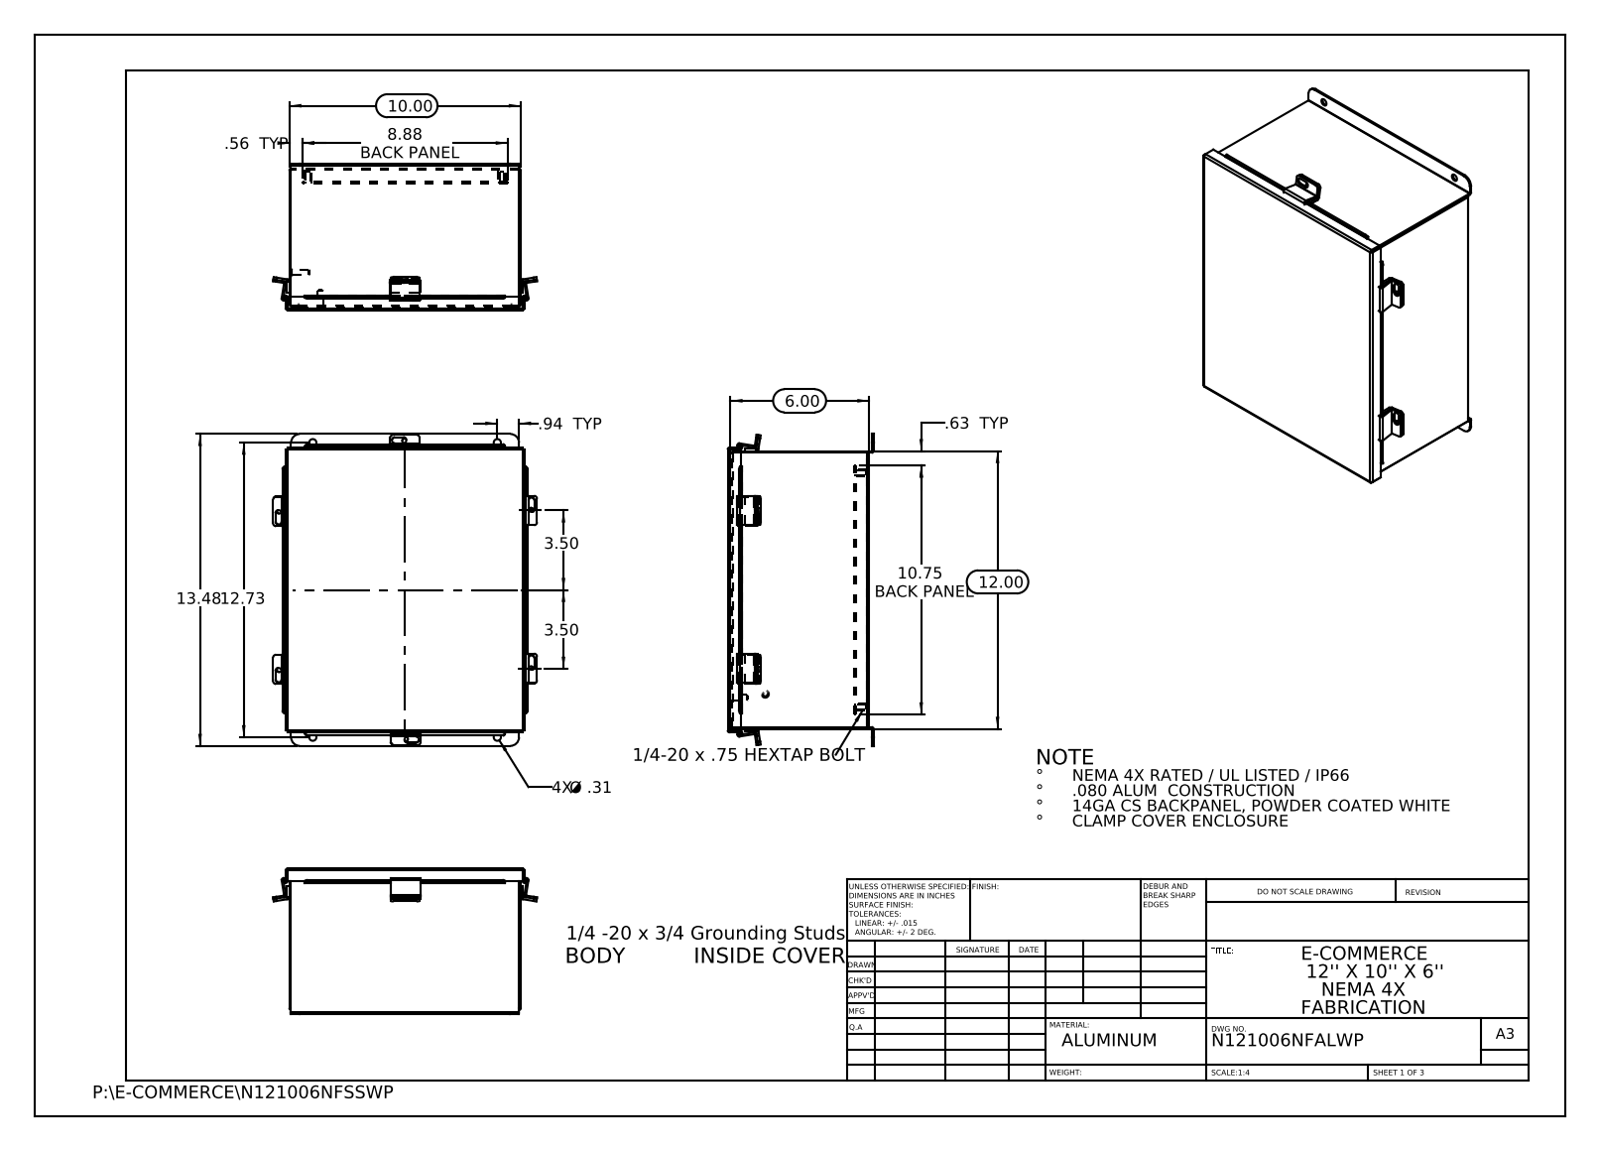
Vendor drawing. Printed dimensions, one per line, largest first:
13.48
12.73
12.00
10.75 BACK PANEL
10.00
8.88 BACK PANEL
6.00
3.50
3.50
.94 TYP
.63 TYP
.56 TYP
4X Ø .31
